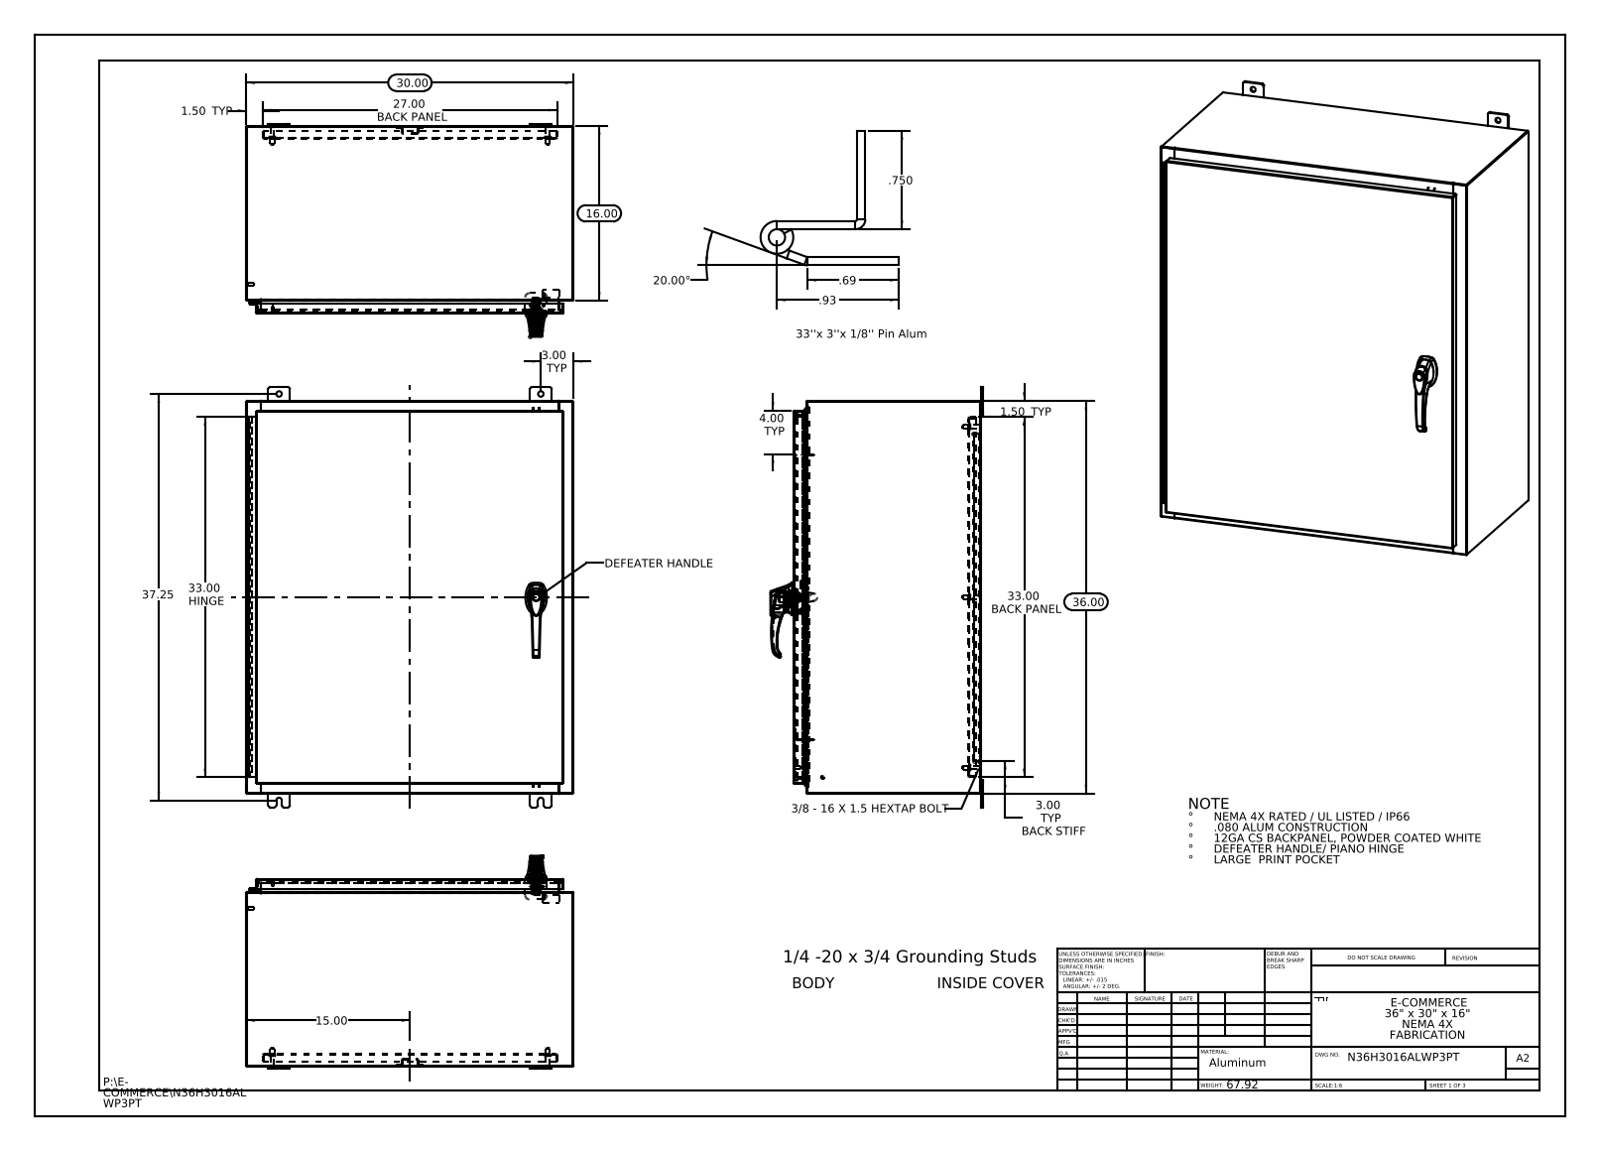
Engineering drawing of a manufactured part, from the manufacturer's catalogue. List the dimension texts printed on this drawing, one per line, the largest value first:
37.25
36.00
33.00 HINGE
33.00 BACK PANEL
30.00
27.00 BACK PANEL
20.00°
16.00
15.00
4.00 TYP
3.00 TYP
3.00 TYP BACK STIFF
1.50 TYP
1.50 TYP
.93
.750
.69
